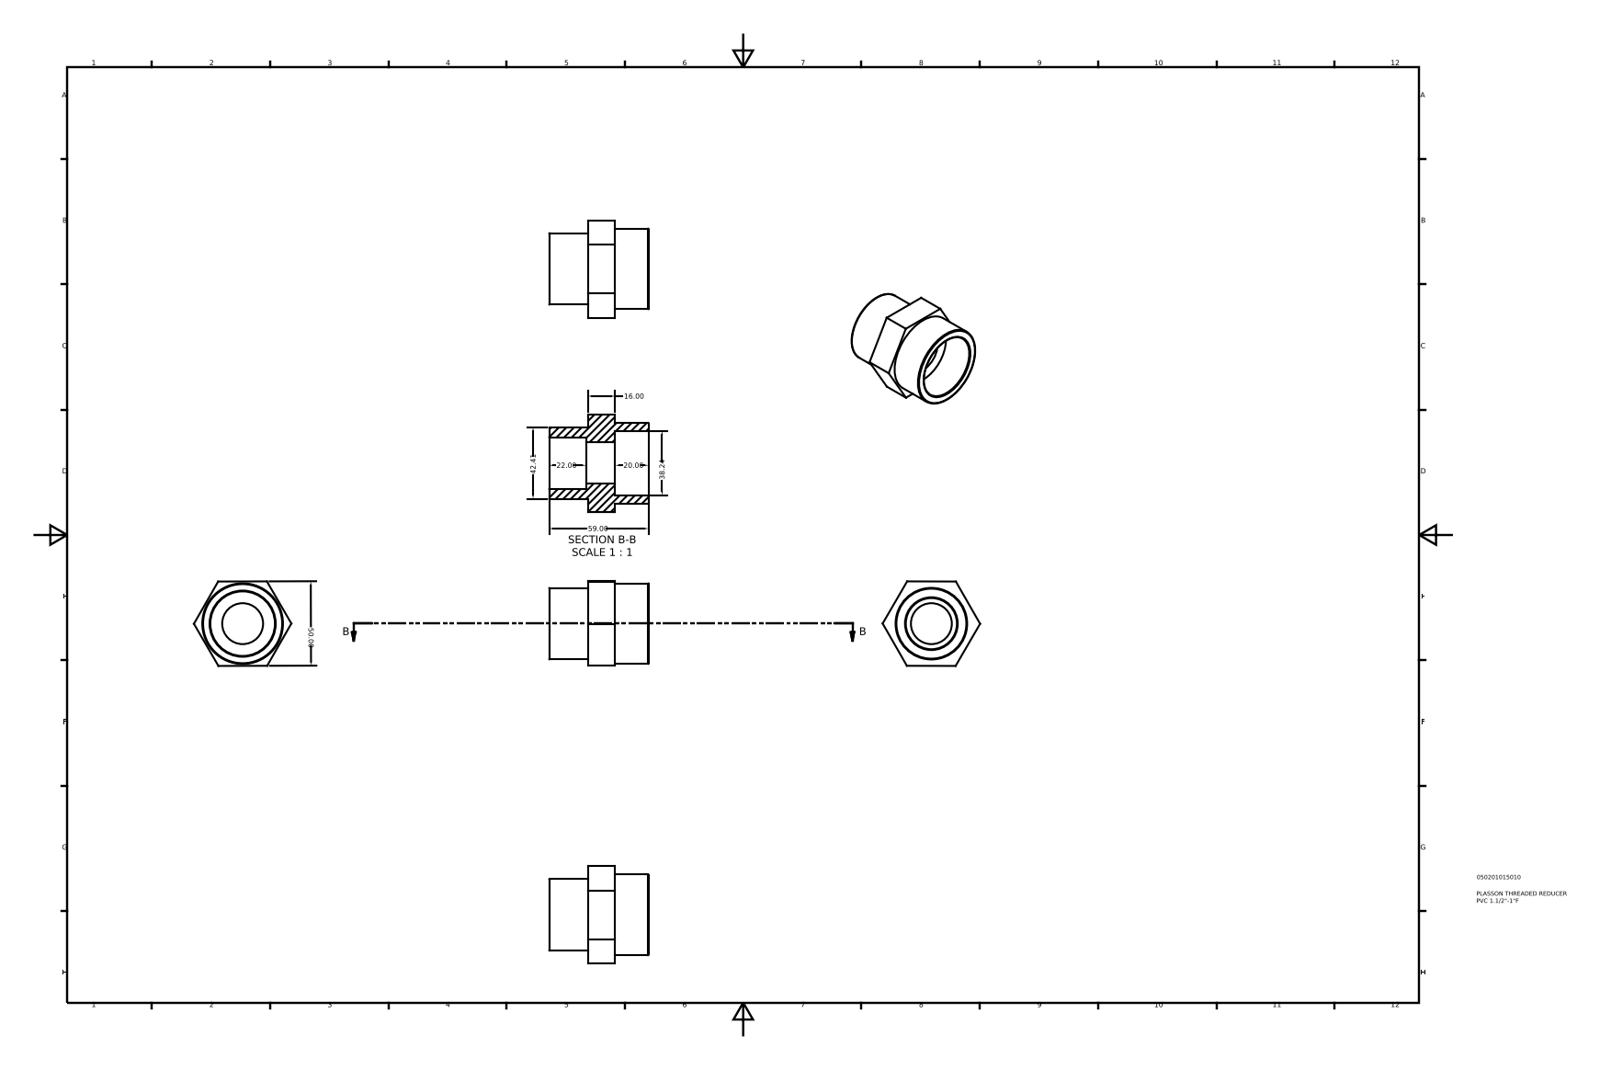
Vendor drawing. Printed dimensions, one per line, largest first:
59.00
50.00
42.41
38.24
22.00
20.00
16.00
